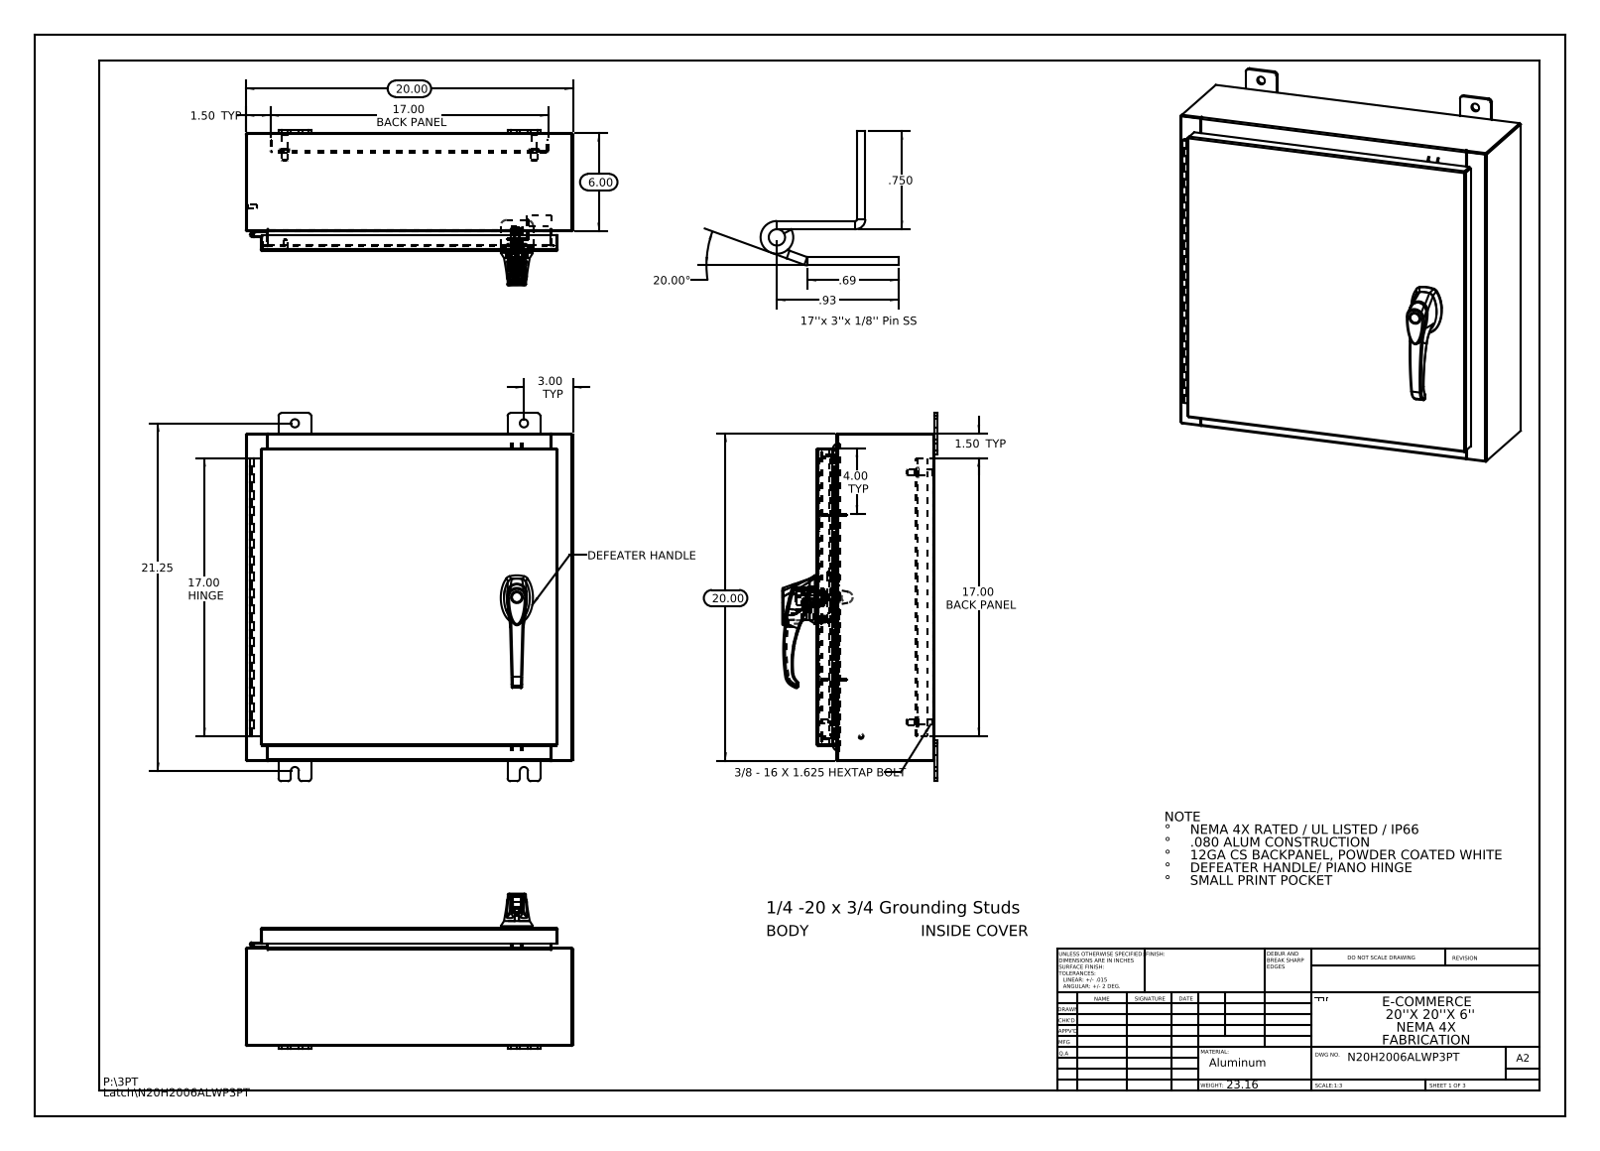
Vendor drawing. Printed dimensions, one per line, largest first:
21.25
20.00
20.00
20.00°
17.00 HINGE
17.00 BACK PANEL
17.00 BACK PANEL
6.00
4.00 TYP
3.00 TYP
1.50 TYP
1.50 TYP
.93
.750
.69
